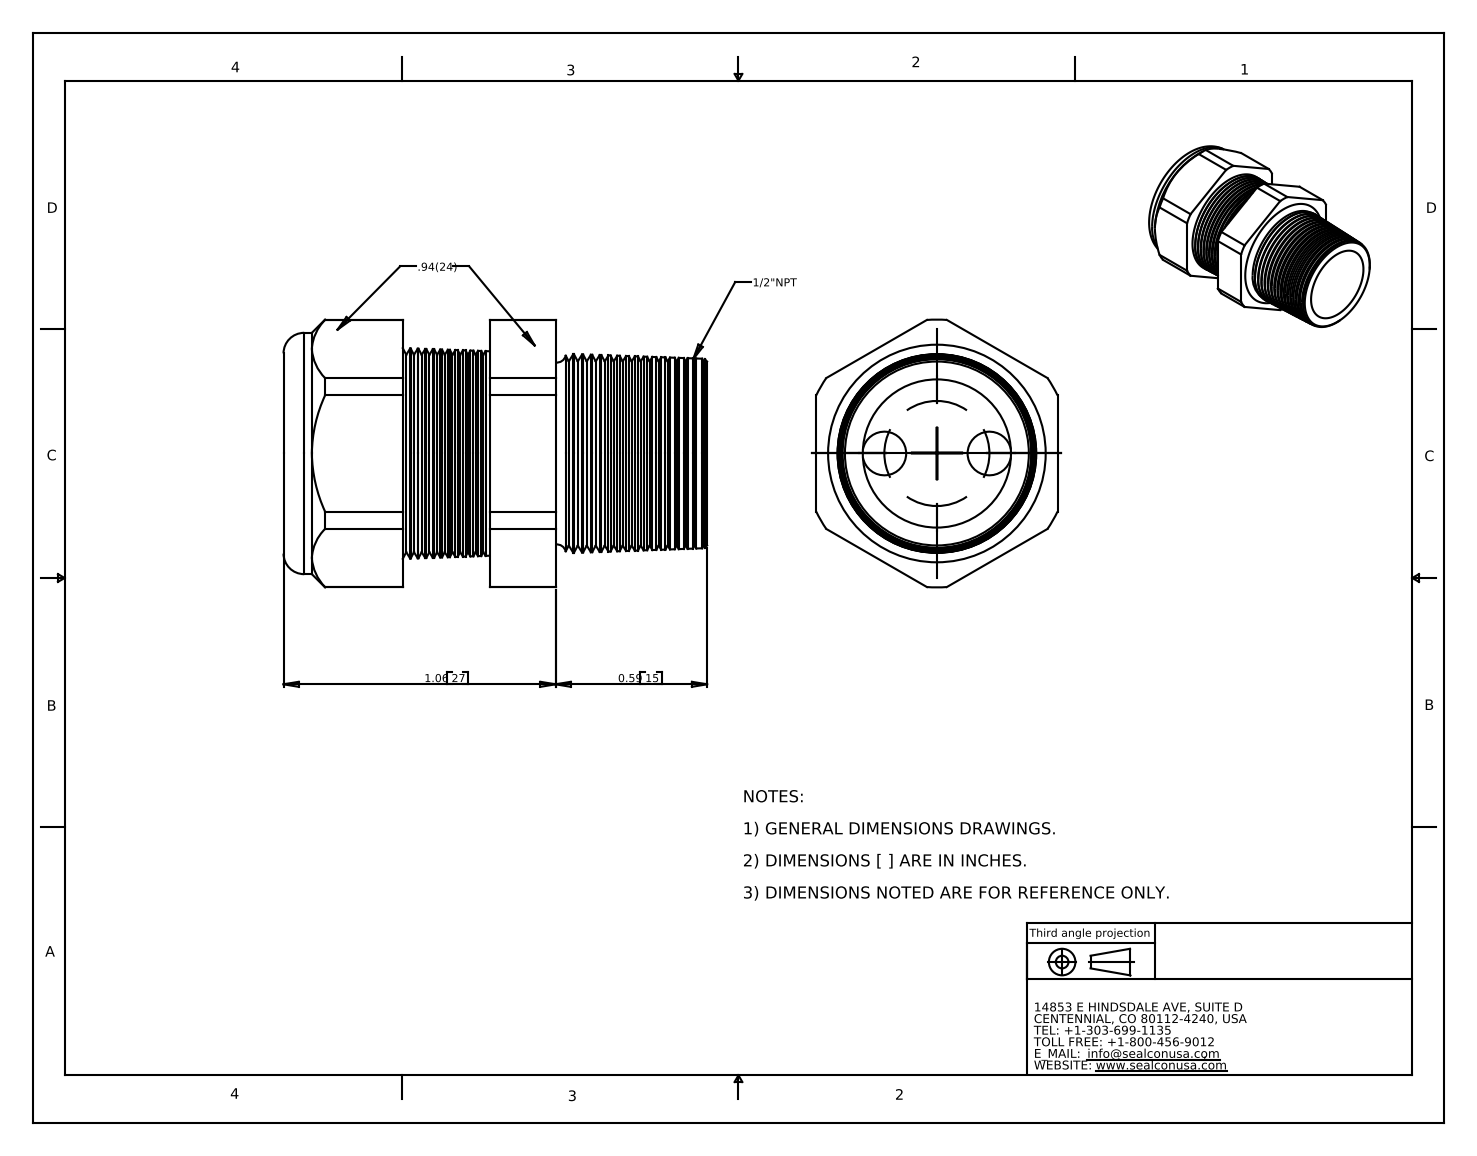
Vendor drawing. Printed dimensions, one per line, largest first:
1.06 27
0.59 15
